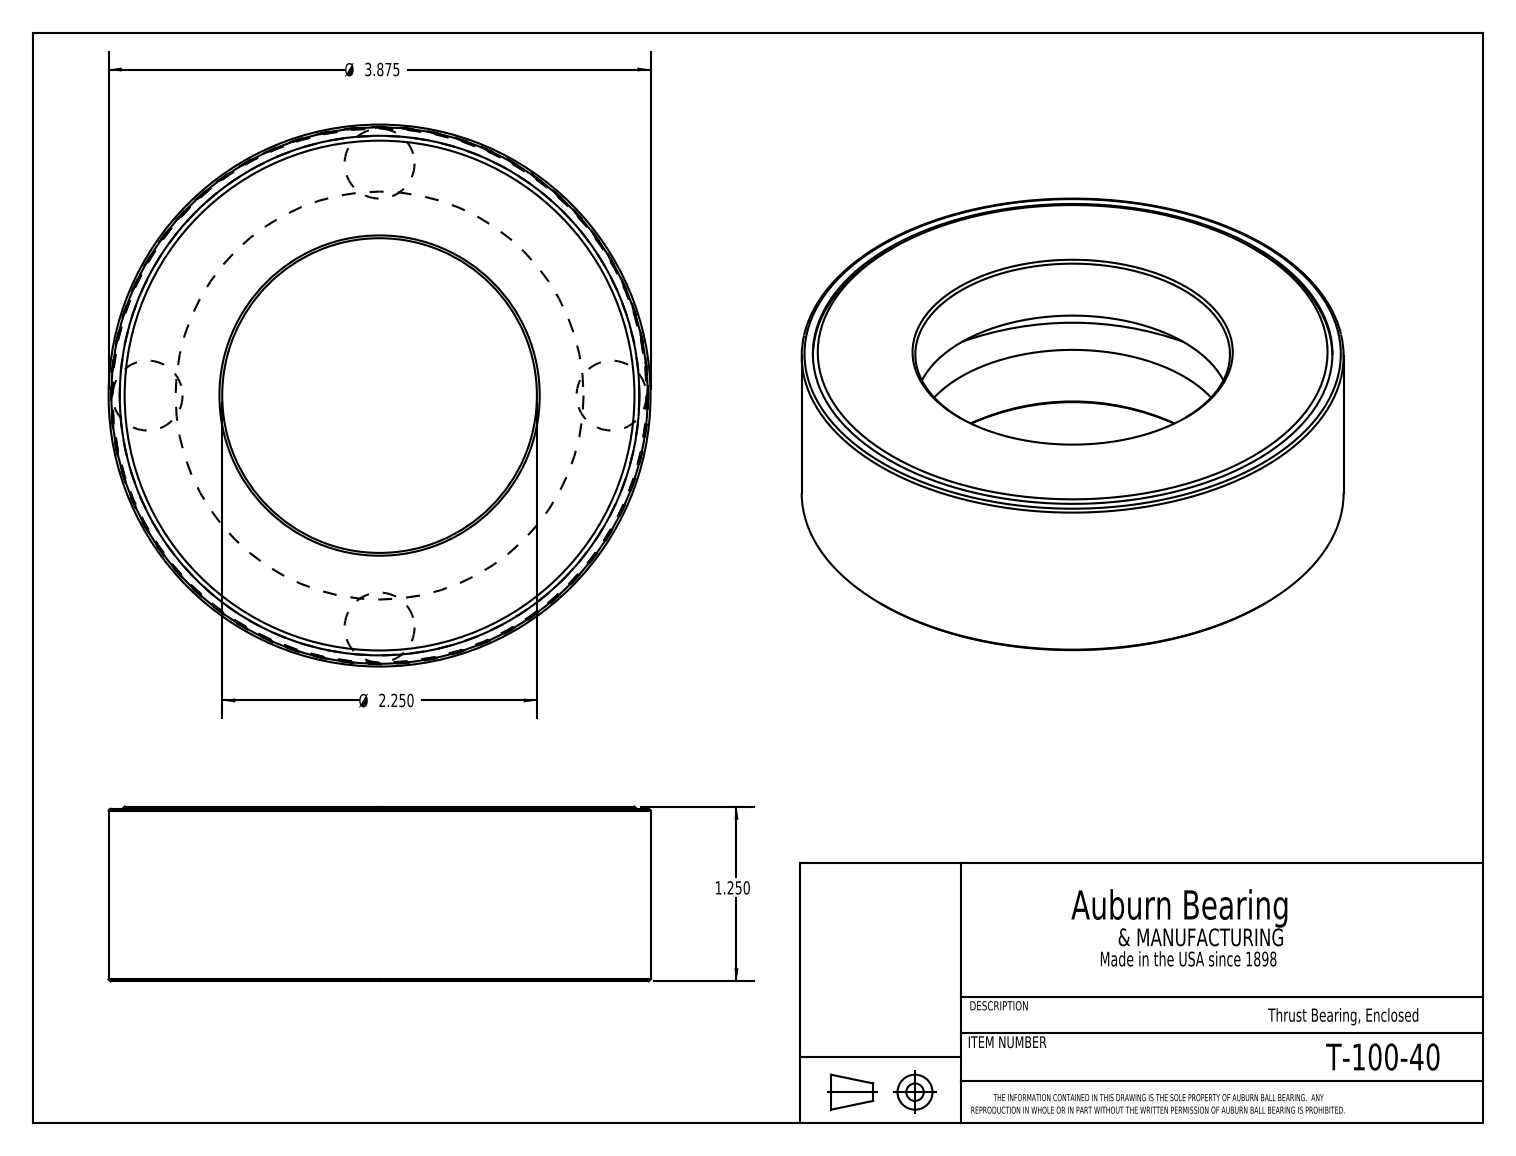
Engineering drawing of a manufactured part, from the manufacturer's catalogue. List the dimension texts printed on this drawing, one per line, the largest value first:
Ø 3.875
Ø 2.250
1.250
